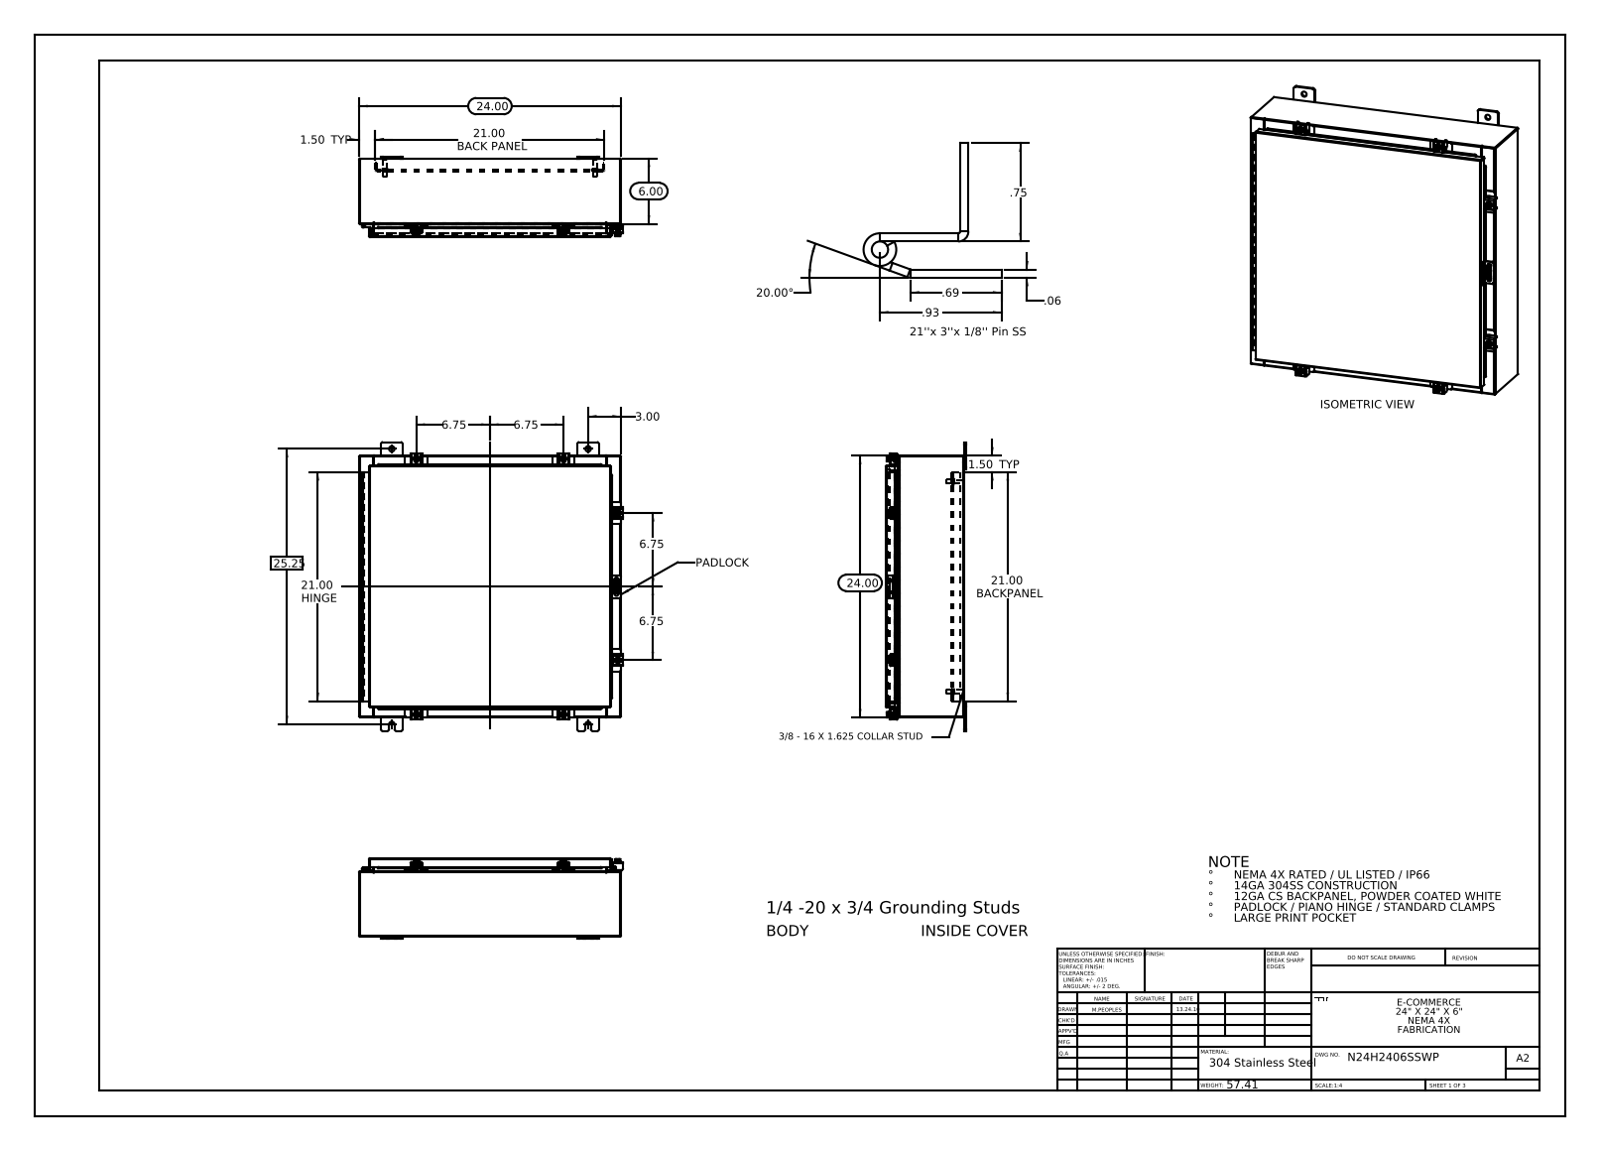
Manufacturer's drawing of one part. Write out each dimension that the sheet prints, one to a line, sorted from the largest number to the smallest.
25.25
24.00
24.00
21.00 HINGE
21.00 BACK PANEL
21.00 BACKPANEL
20.00°
6.75
6.75
6.75
6.75
6.00
3.00
1.50 TYP
1.50 TYP
.93
.75
.69
.06
